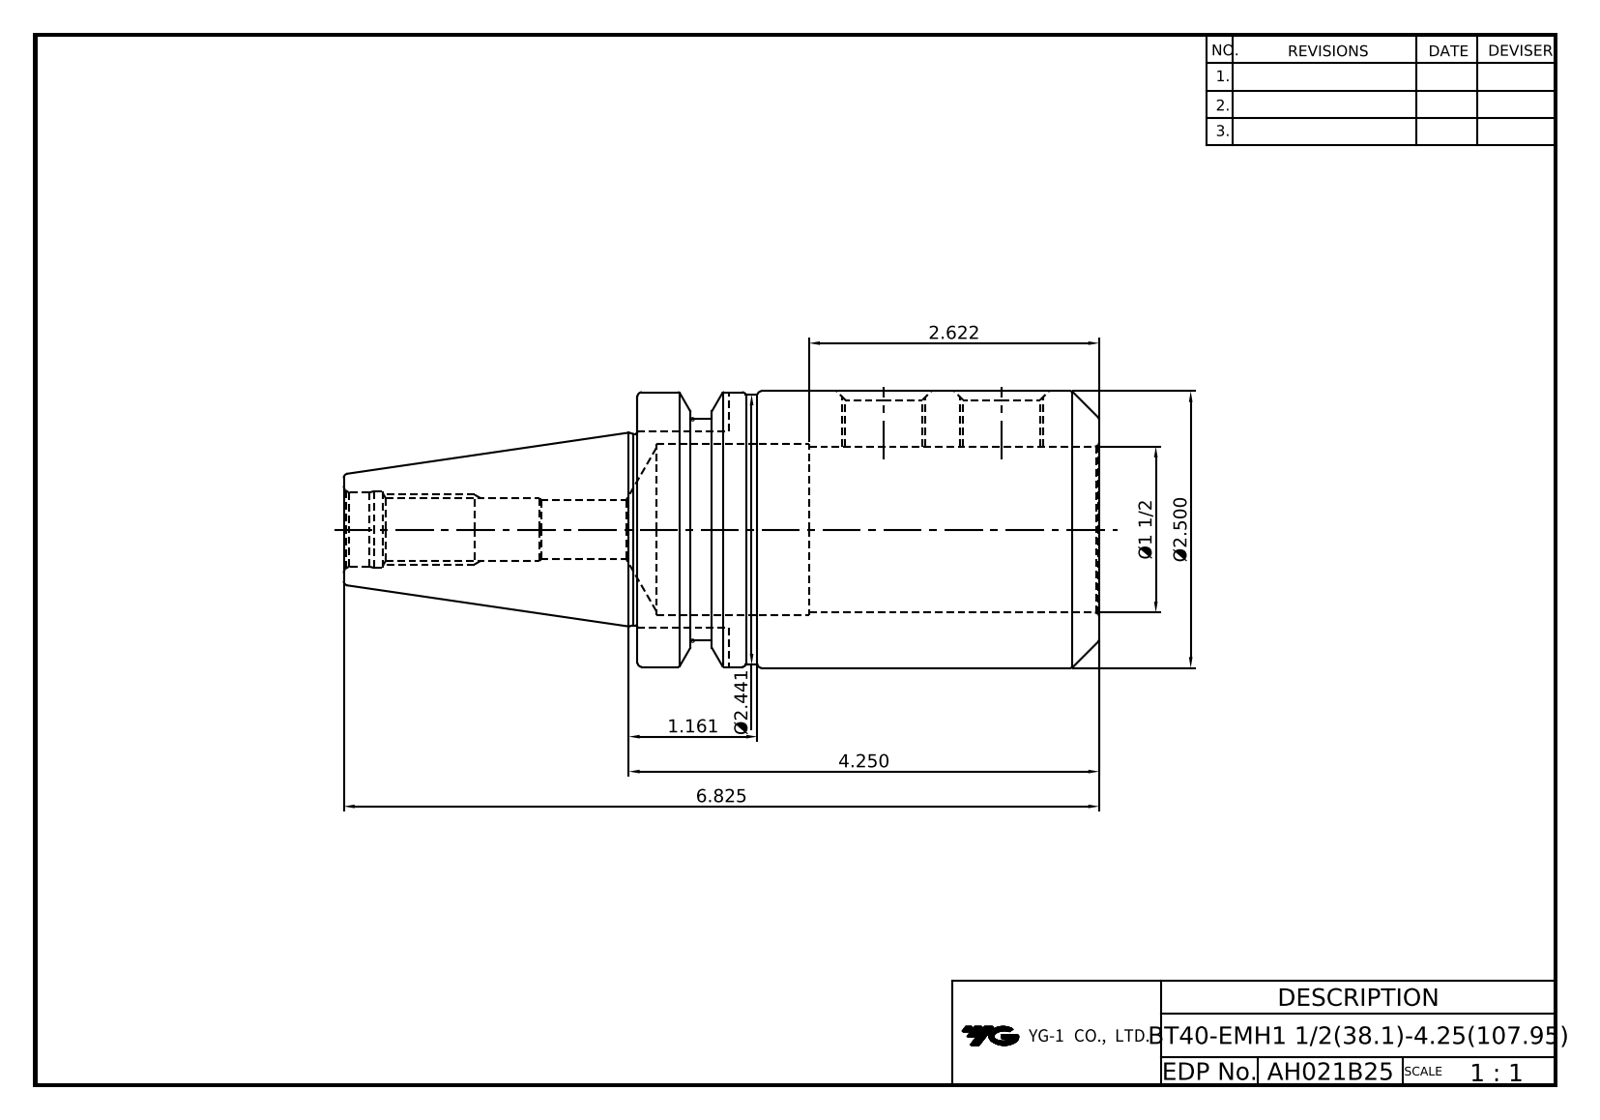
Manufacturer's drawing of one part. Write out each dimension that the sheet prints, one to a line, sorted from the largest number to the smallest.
6.825
4.250
2.622
Ø2.500
Ø2.441
Ø1 1/2
1.161
